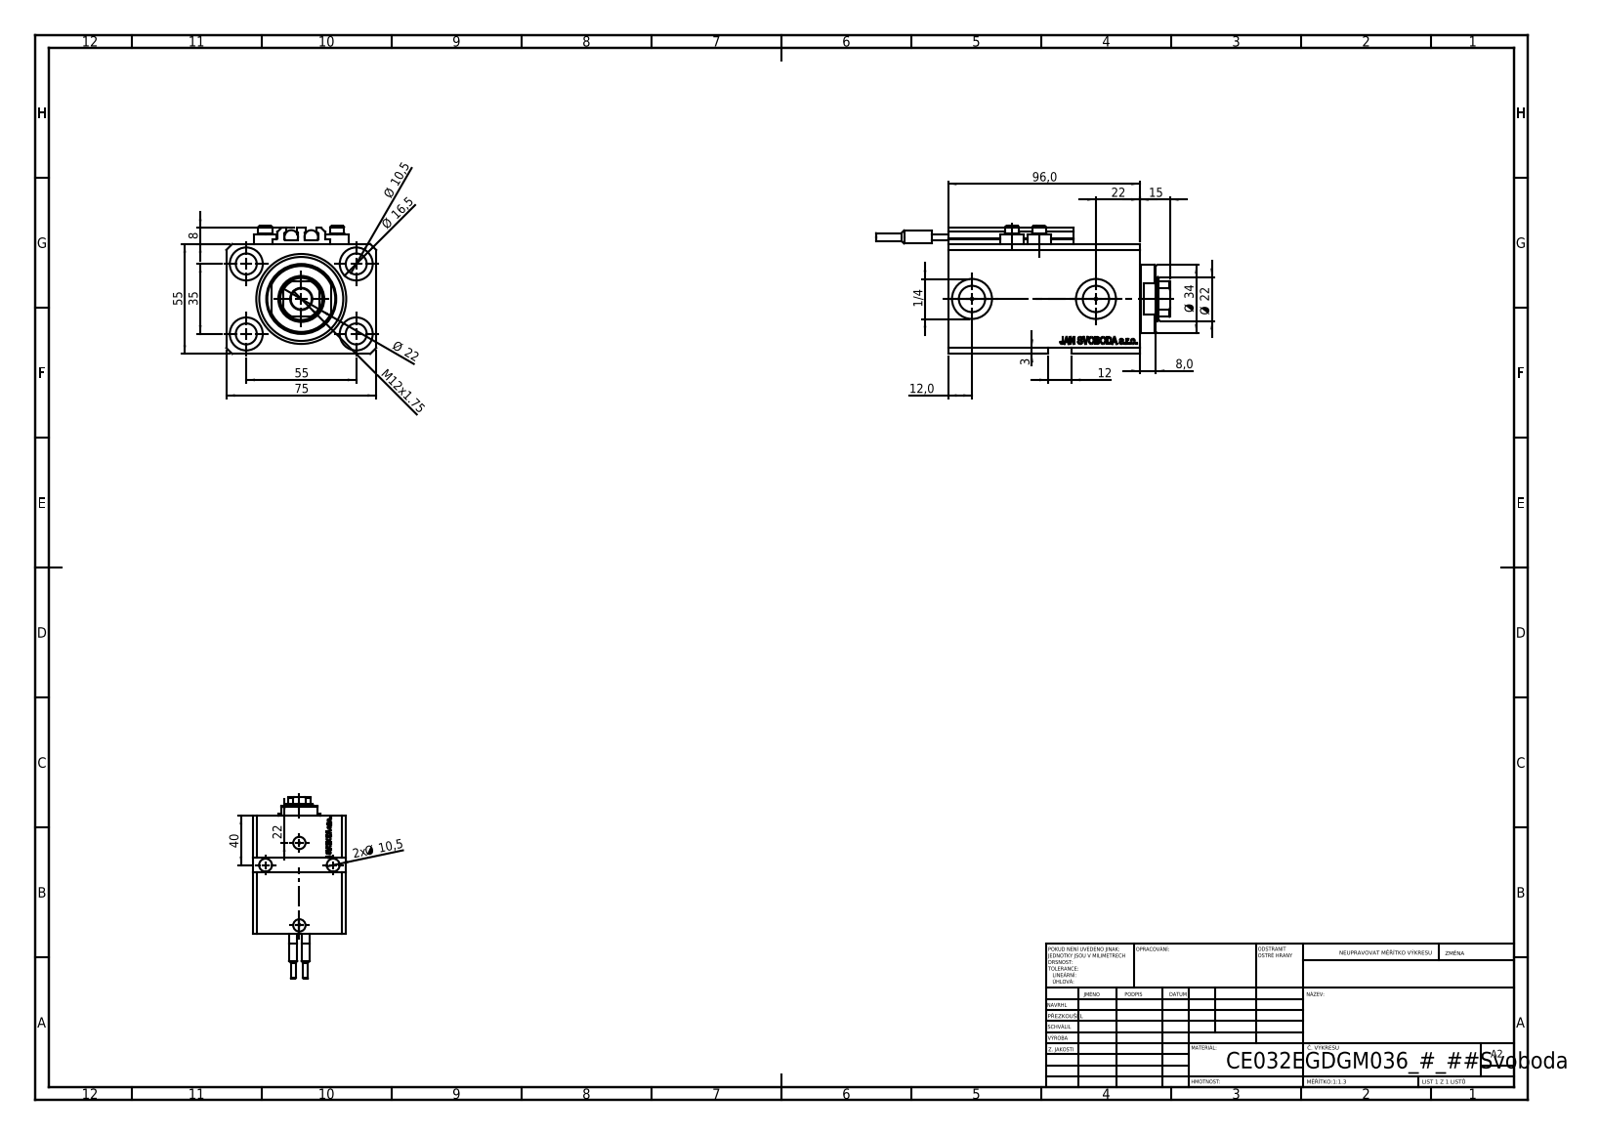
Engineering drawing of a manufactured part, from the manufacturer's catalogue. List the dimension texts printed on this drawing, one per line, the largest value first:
96,0
75
55
55
40
35
Ø 34
Ø 22
22
Ø 22
22
Ø 16,5
15
M12x1.75
12,0
12
Ø 10,5
2x Ø 10,5
8
8,0
3
1/4
